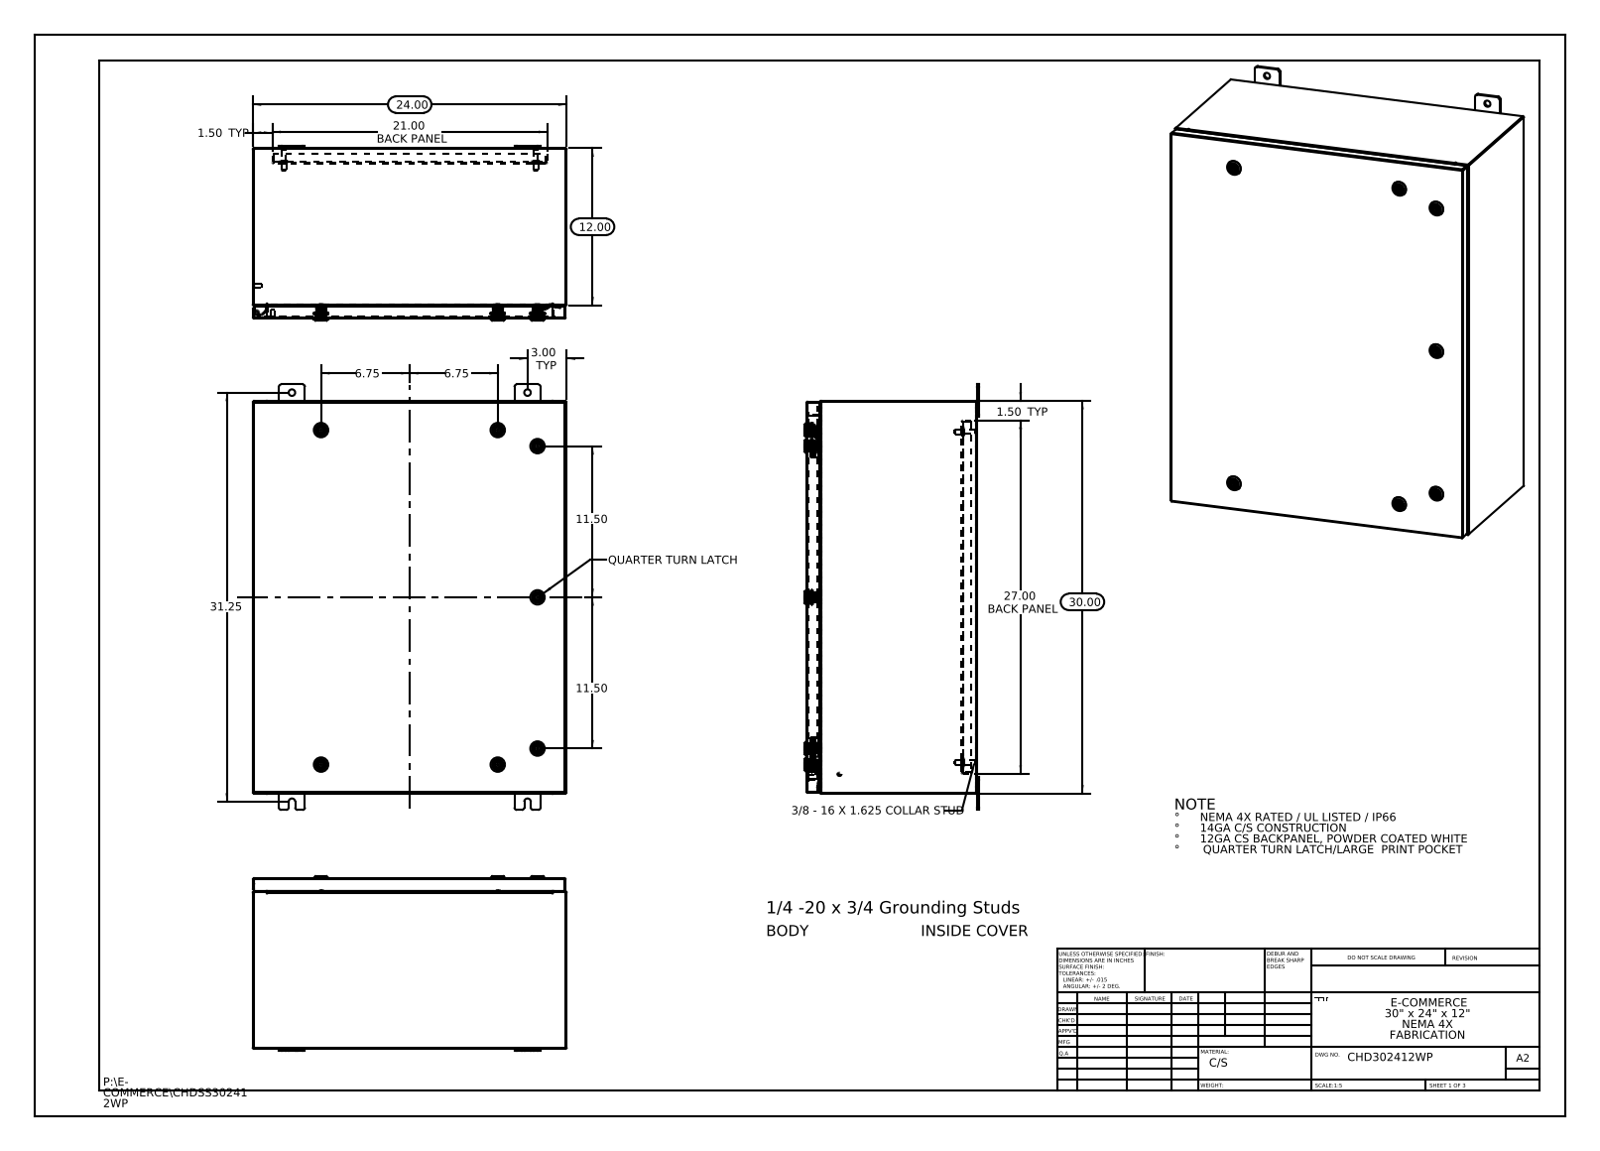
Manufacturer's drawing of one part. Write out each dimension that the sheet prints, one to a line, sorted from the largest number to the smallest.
31.25
30.00
27.00 BACK PANEL
24.00
21.00 BACK PANEL
12.00
11.50
11.50
6.75
6.75
3.00 TYP
1.50 TYP
1.50 TYP
